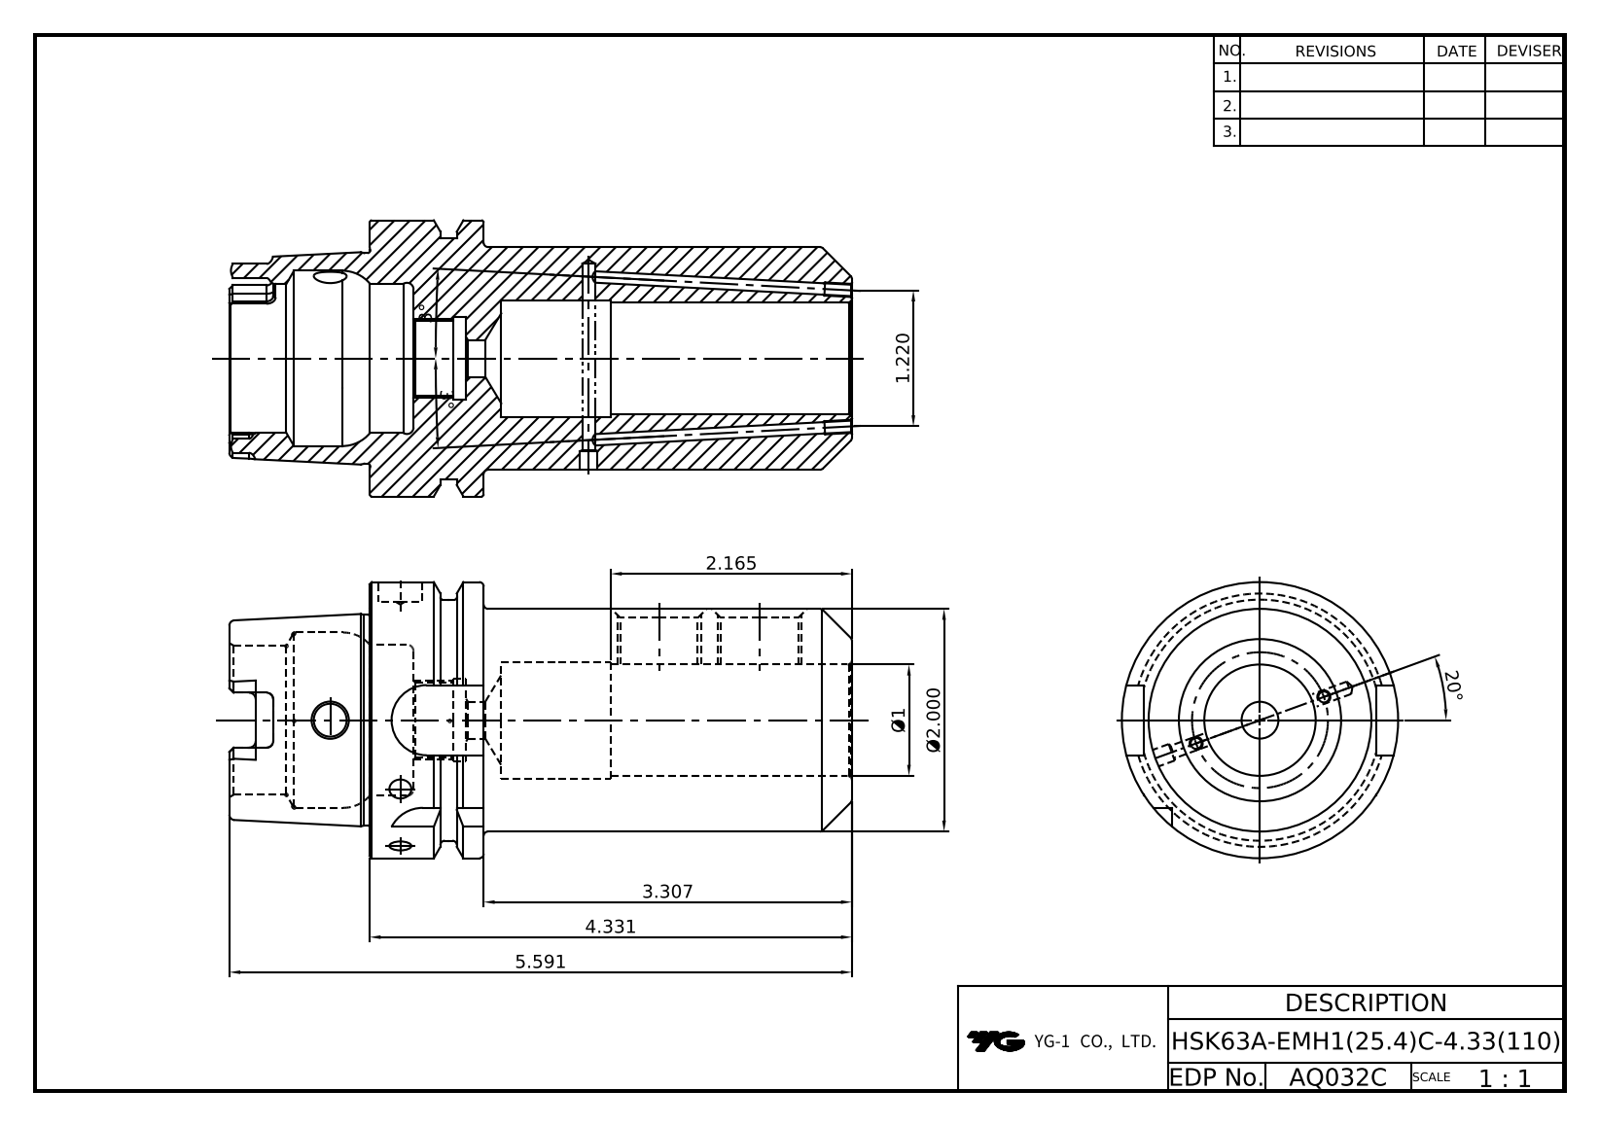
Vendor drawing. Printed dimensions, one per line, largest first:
20°
5.591
4.331
3.307
3°
3°
2.165
Ø2.000
1.220
Ø1
